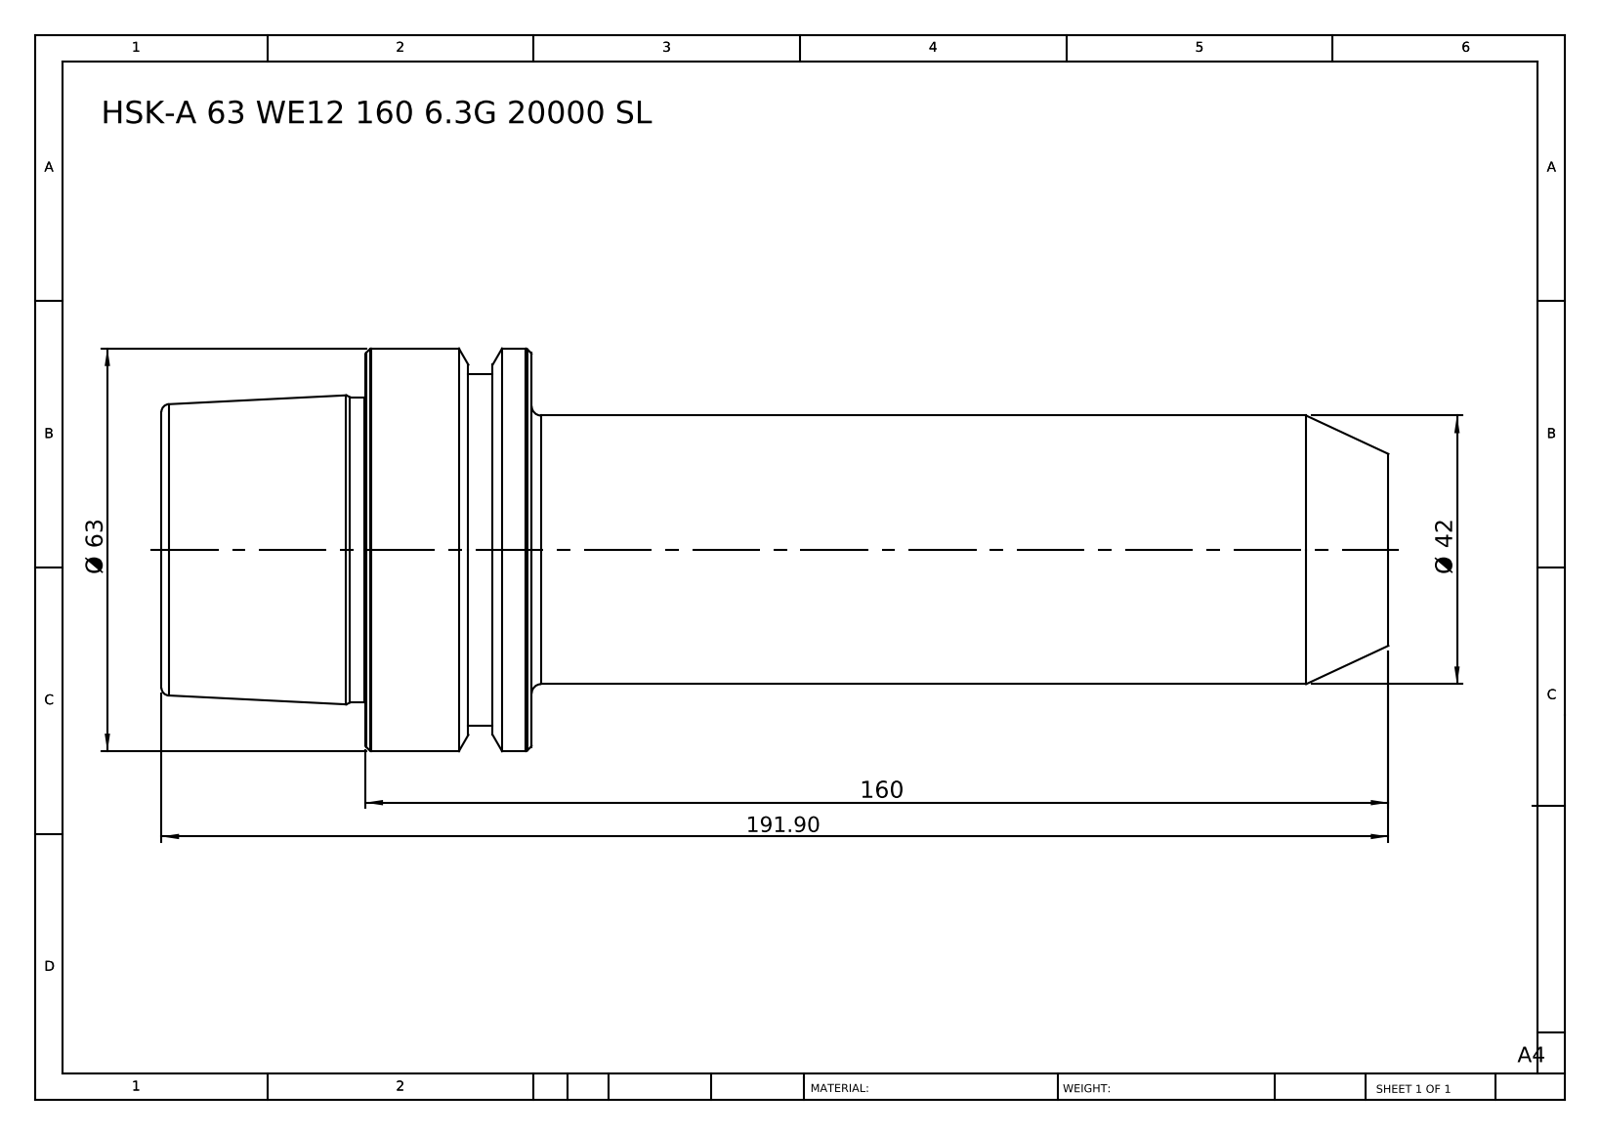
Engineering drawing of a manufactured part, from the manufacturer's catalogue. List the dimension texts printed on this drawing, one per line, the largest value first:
191.90
160
Ø 63
Ø 42
